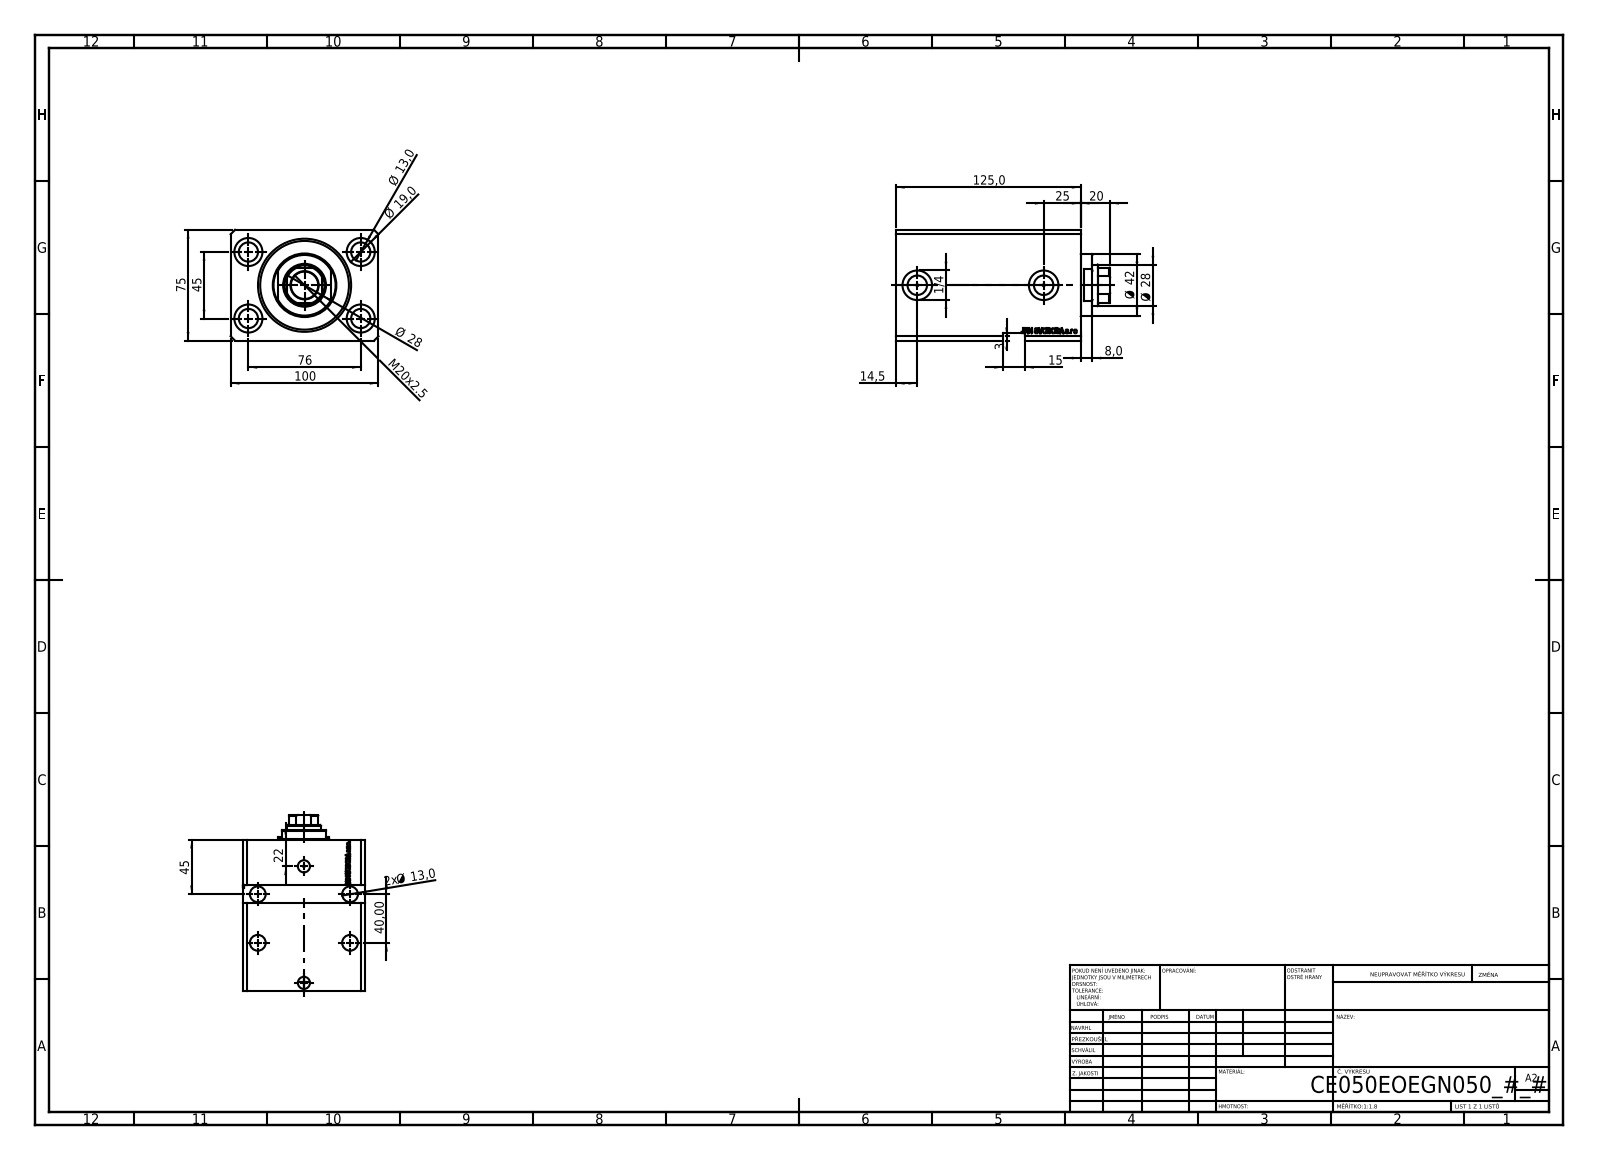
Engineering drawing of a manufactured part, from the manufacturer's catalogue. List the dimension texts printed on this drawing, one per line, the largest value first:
125,0
100
76
75
45
45
Ø 42
40,00
Ø 28
Ø 28
25
22
M20x2.5
20
Ø 19,0
15
14,5
Ø 13,0
2x Ø 13,0
8,0
3
1/4
